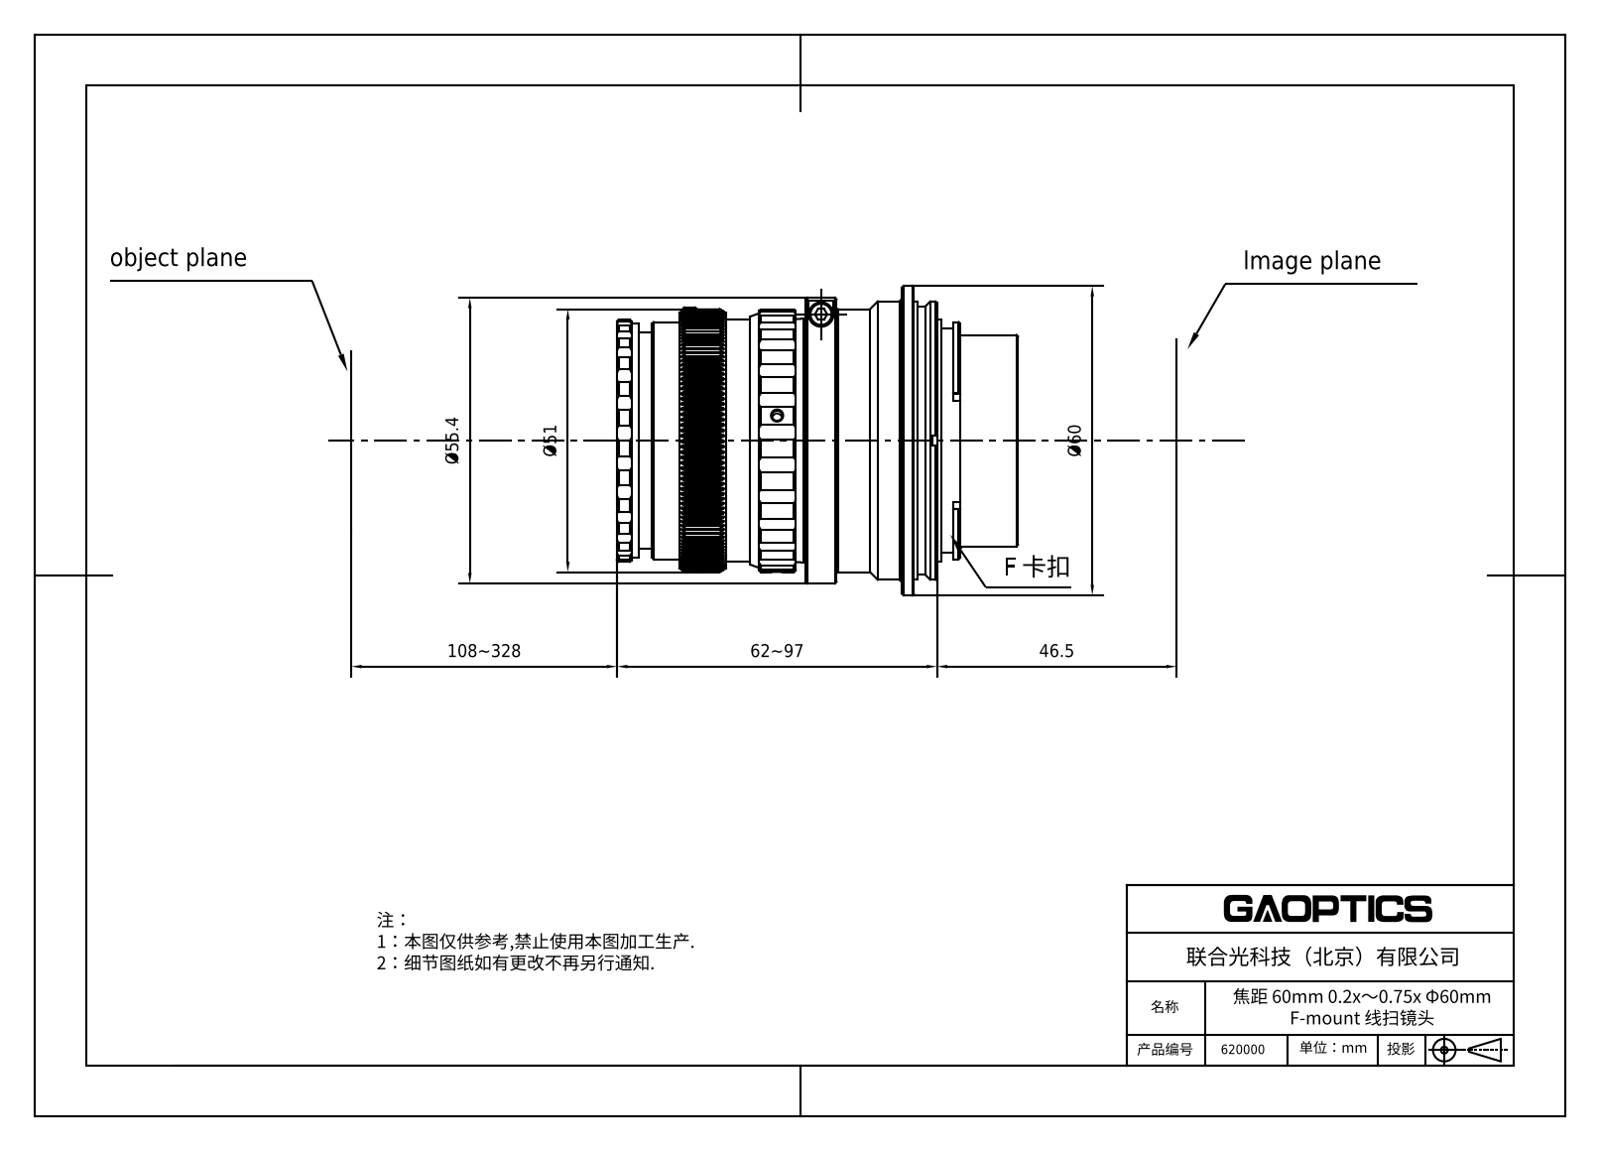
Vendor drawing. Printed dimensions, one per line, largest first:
108~328
62~97
Ø60
Ø55.4
Ø51
46.5
